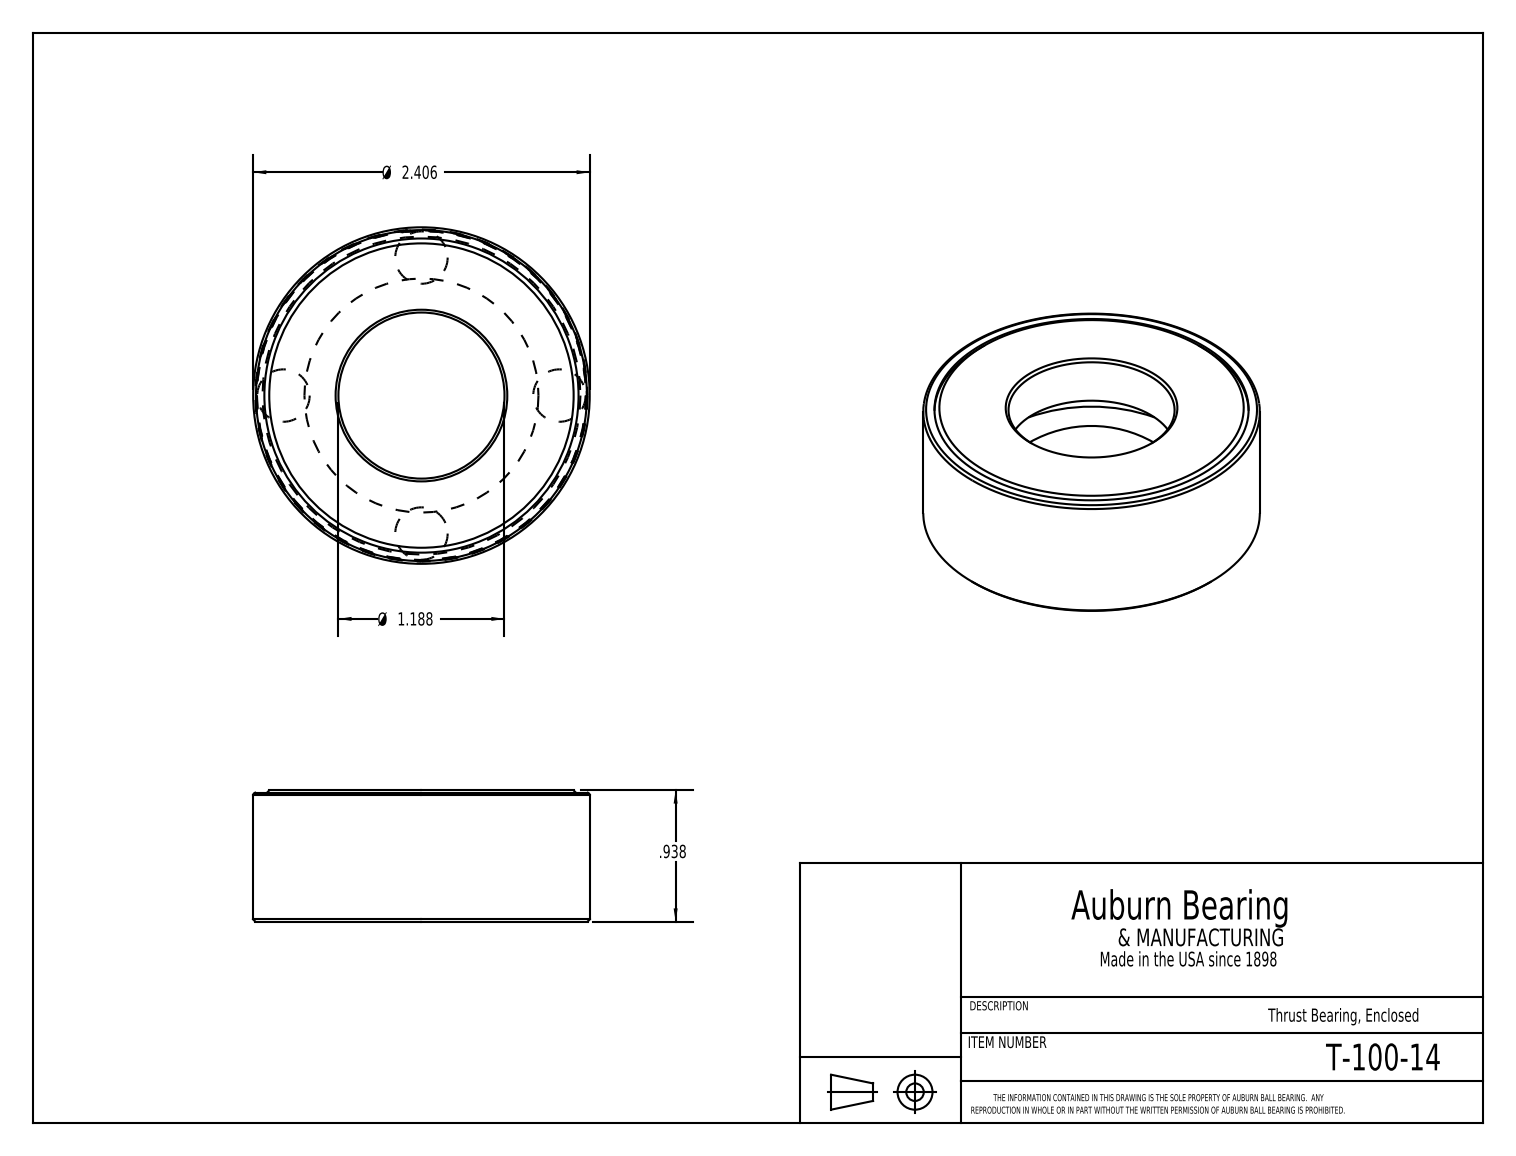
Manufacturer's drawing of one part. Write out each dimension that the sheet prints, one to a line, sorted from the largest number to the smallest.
Ø 2.406
Ø 1.188
.938
